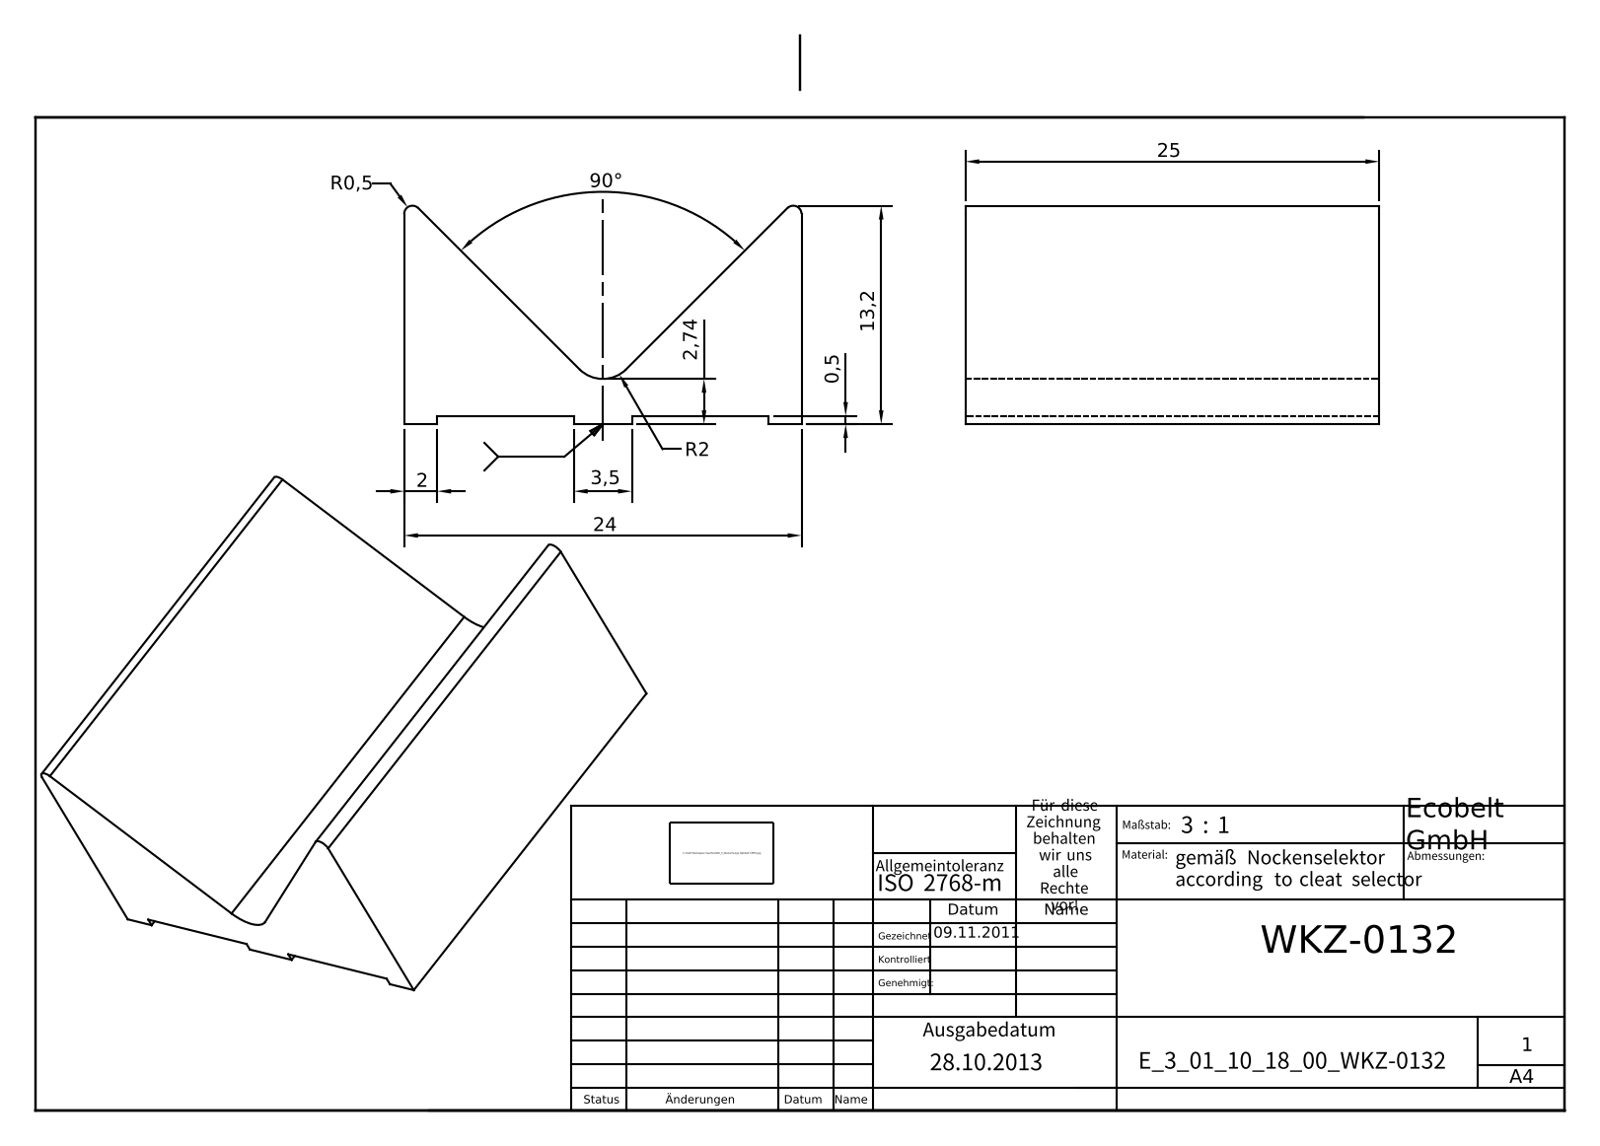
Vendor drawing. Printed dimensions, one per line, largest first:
90°
25
24
13,2
3,5
2,74
2
R2
0,5
R0,5
